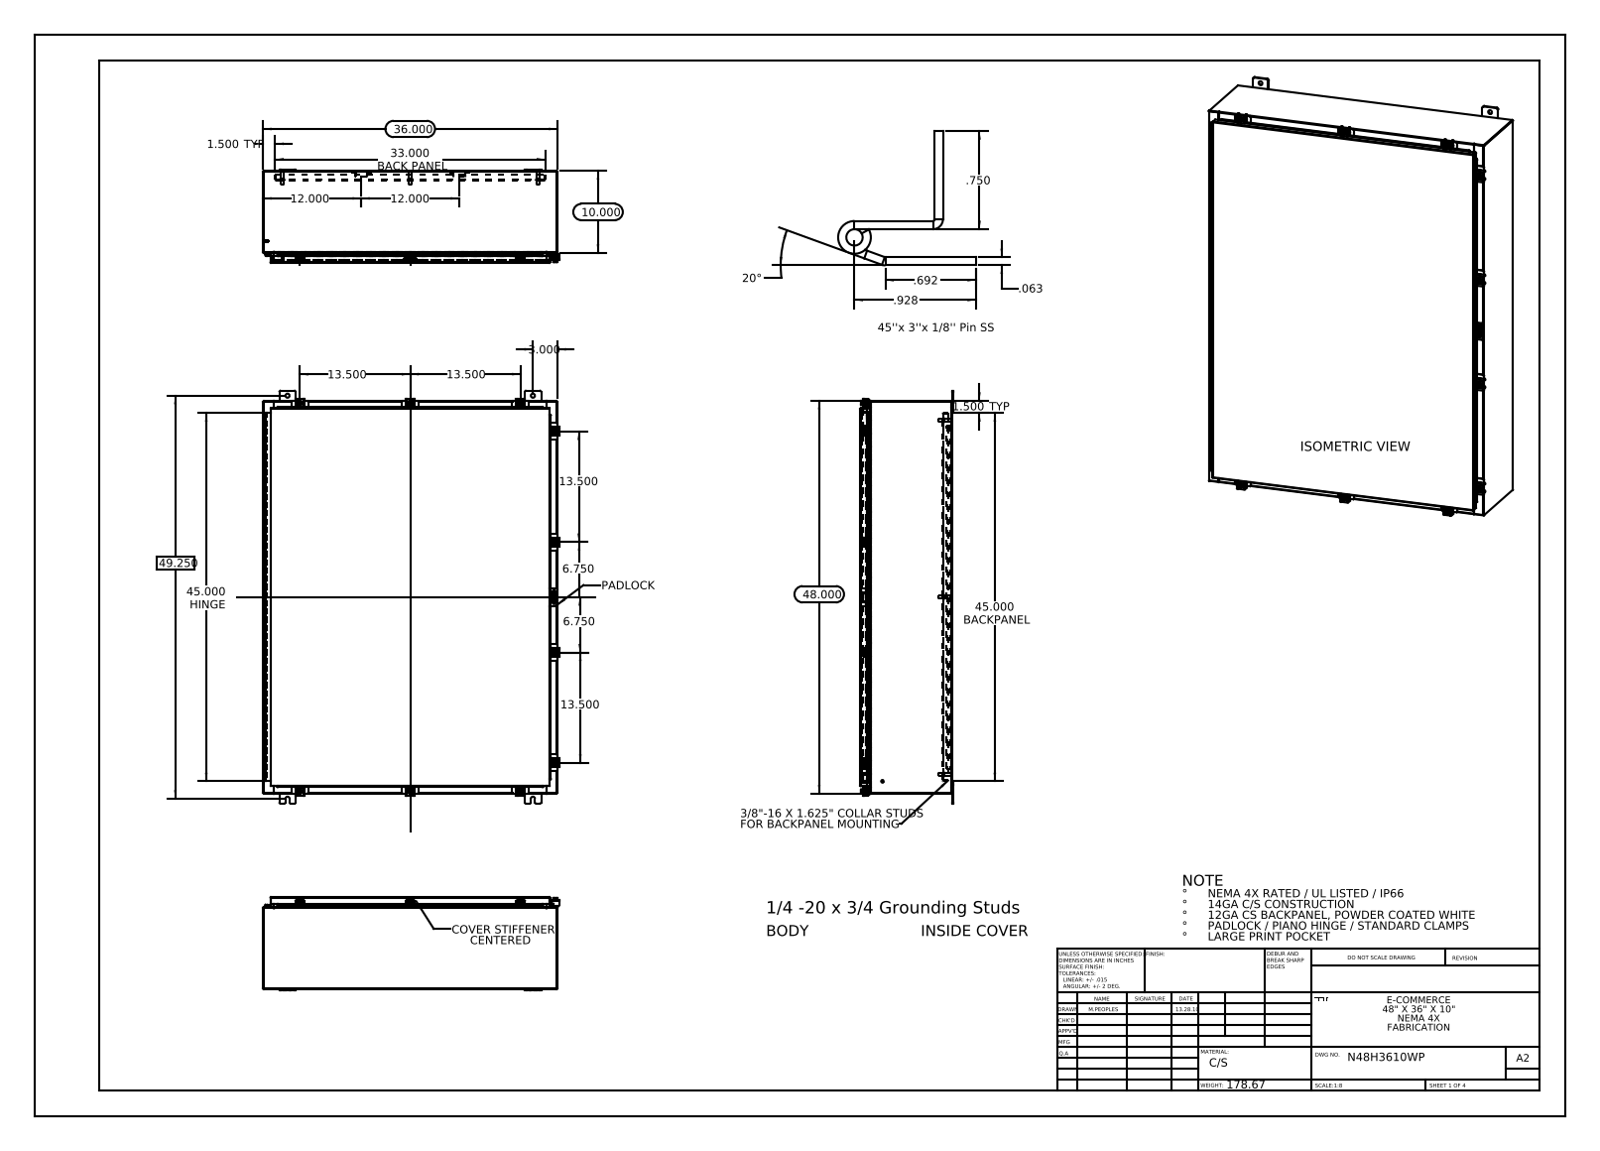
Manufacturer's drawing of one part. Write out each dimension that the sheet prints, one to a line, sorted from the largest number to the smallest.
49.250
48.000
45.000 HINGE
45.000 BACKPANEL
36.000
33.000 BACK PANEL
20°
13.500
13.500
13.500
13.500
12.000
12.000
10.000
6.750
6.750
3.000
1.500 TYP
1.500 TYP
.928
.750
.692
.063
